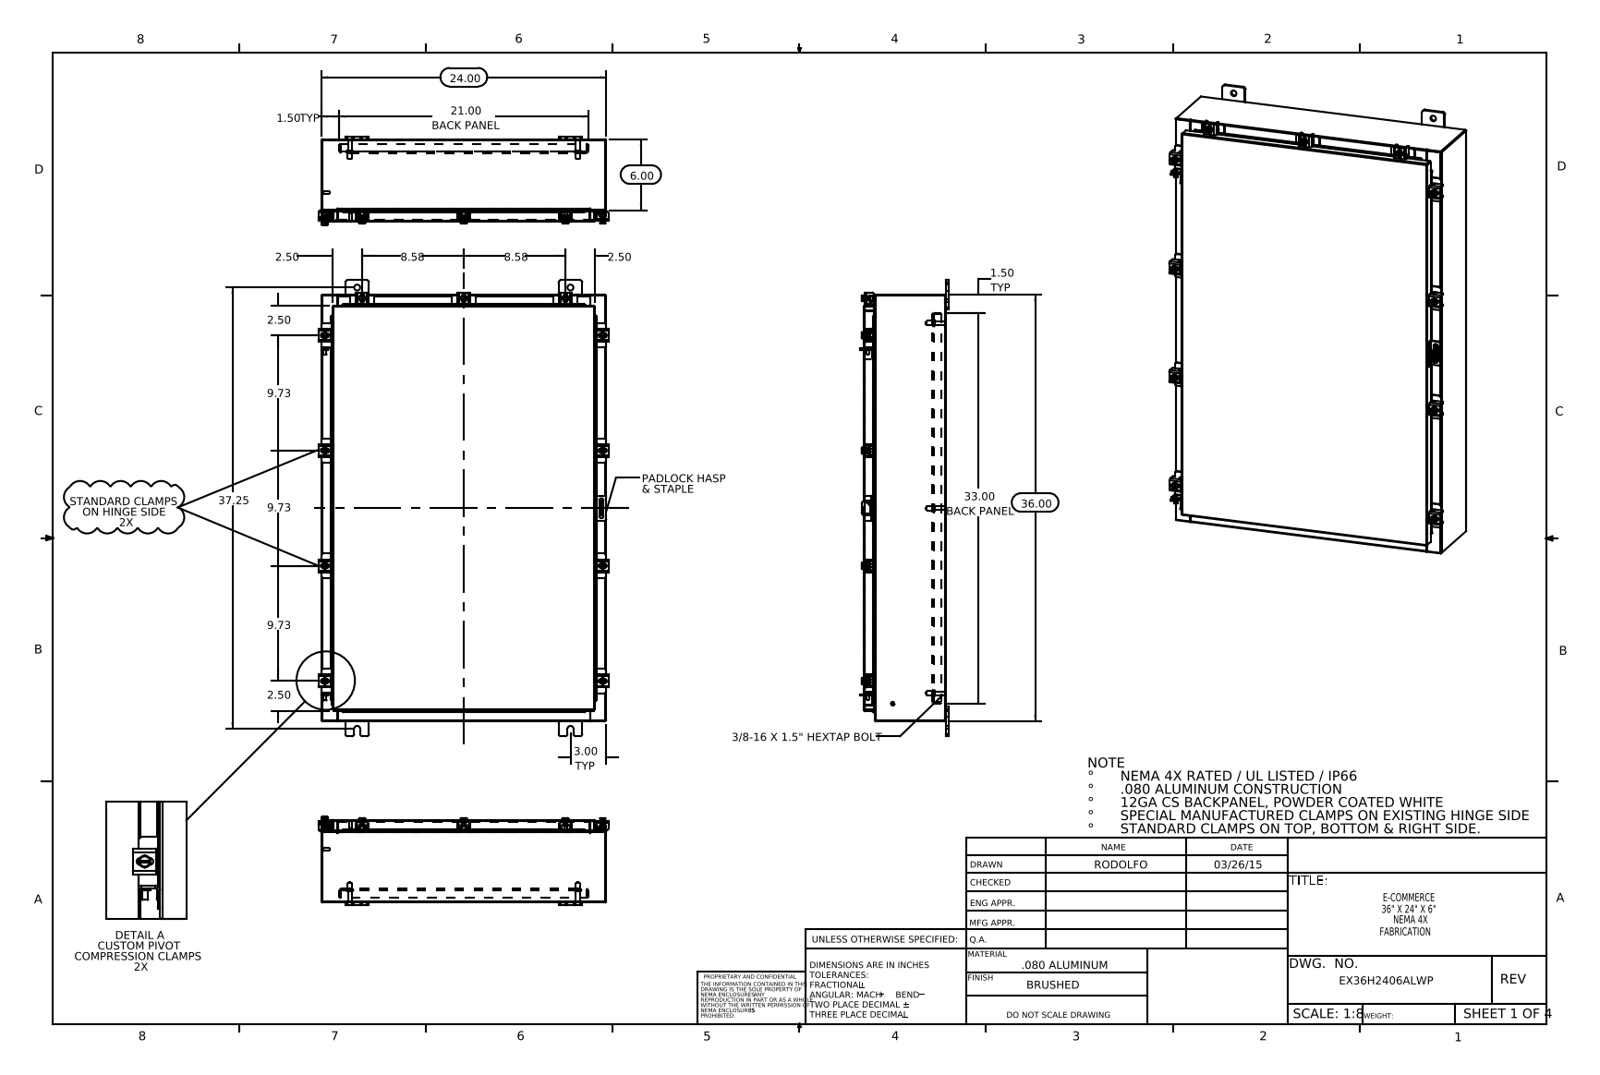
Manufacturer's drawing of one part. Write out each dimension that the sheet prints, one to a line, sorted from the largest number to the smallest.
37.25
36.00
33.00 BACK PANEL
24.00
21.00 BACK PANEL
9.73
9.73
9.73
8.58
8.58
6.00
3.00 TYP
2.50
2.50
2.50
2.50
1.50 TYP
1.50 TYP
